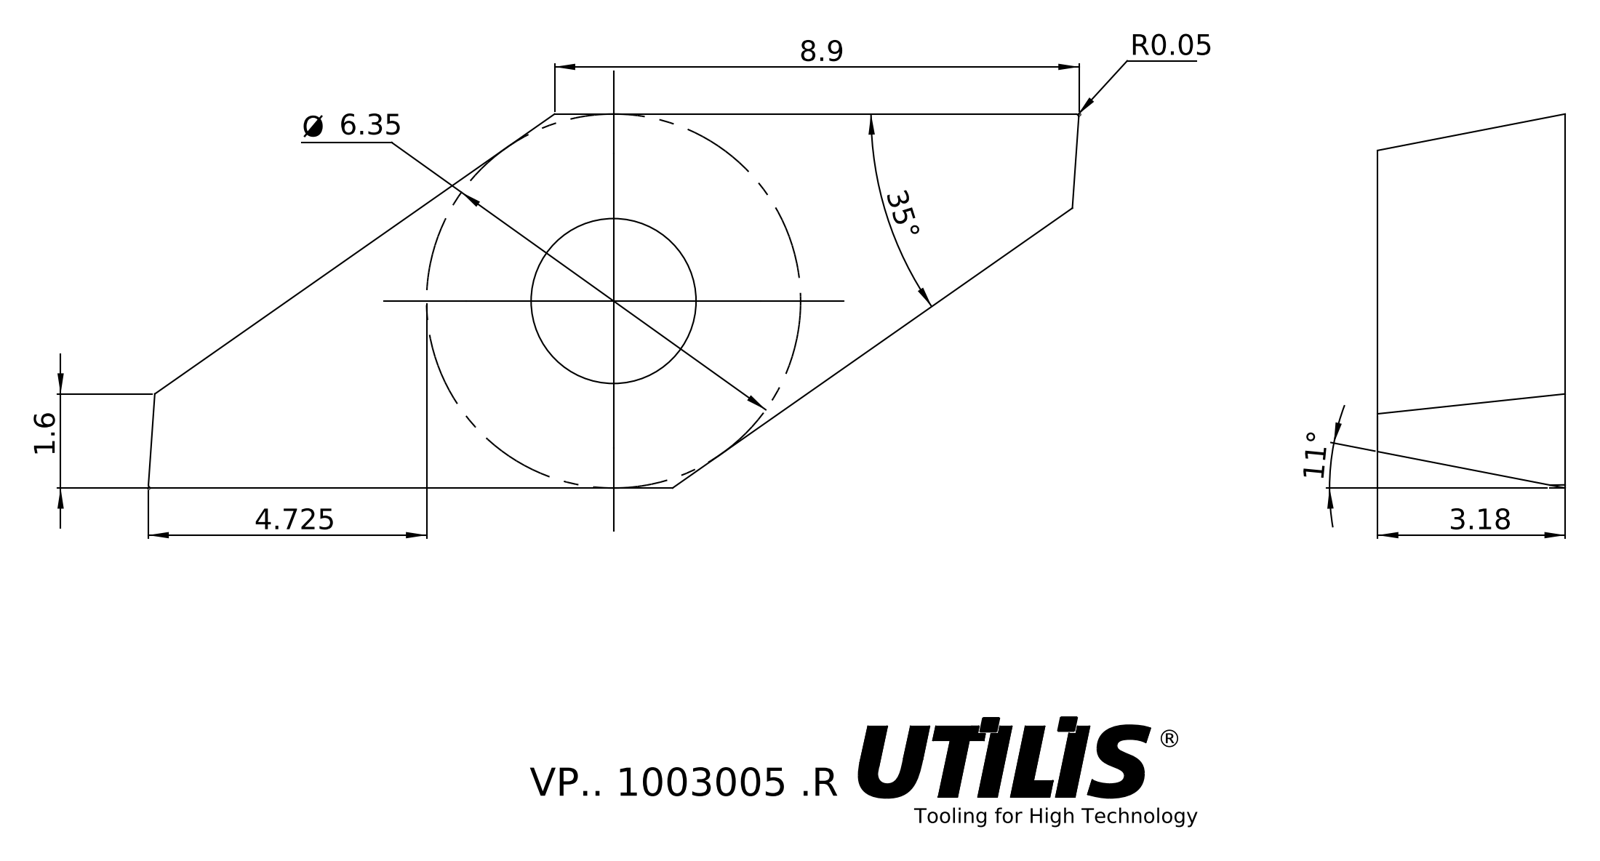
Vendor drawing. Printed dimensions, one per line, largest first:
35°
11°
8.9
Ø 6.35
4.725
3.18
1.6
R0.05
